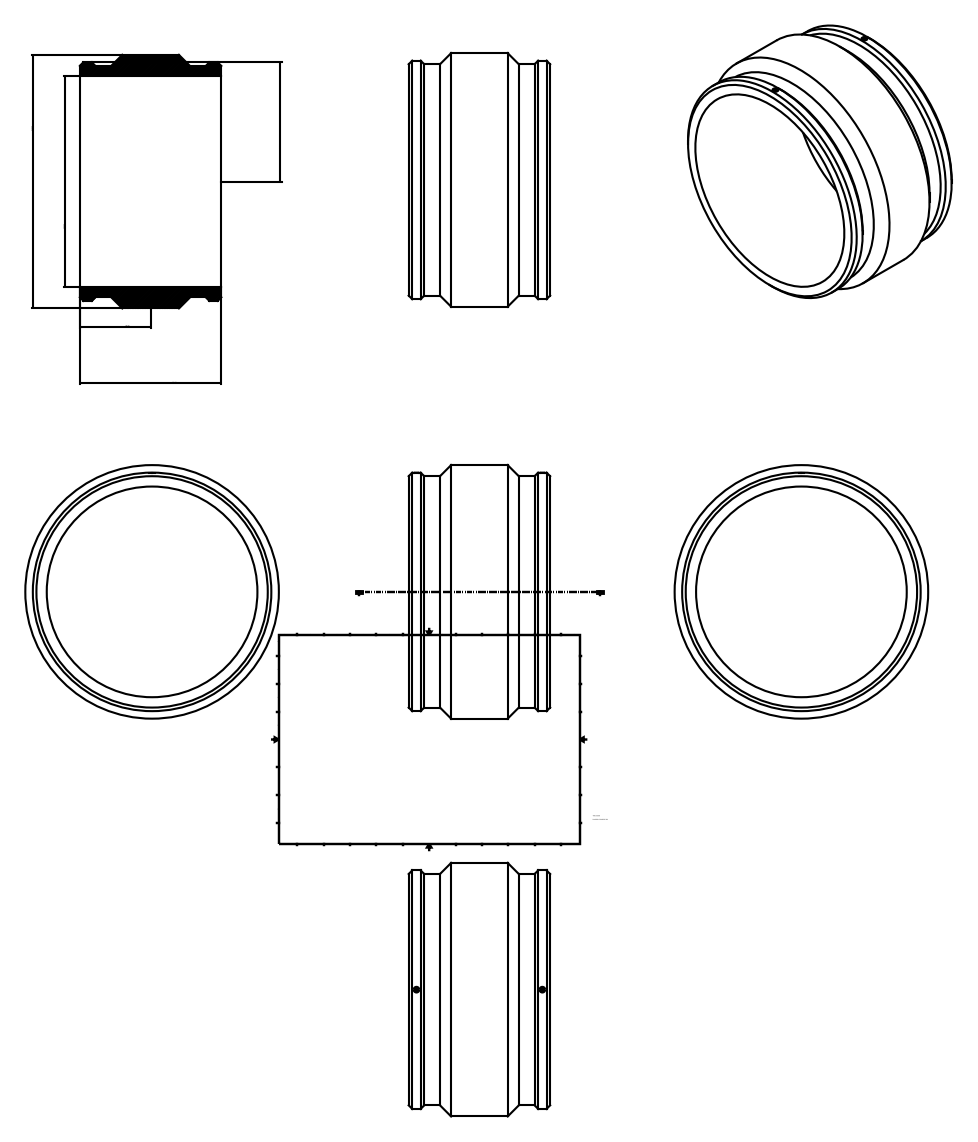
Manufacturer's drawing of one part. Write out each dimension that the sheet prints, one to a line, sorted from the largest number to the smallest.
674,00
560,00
376,00
317,00
188,00
